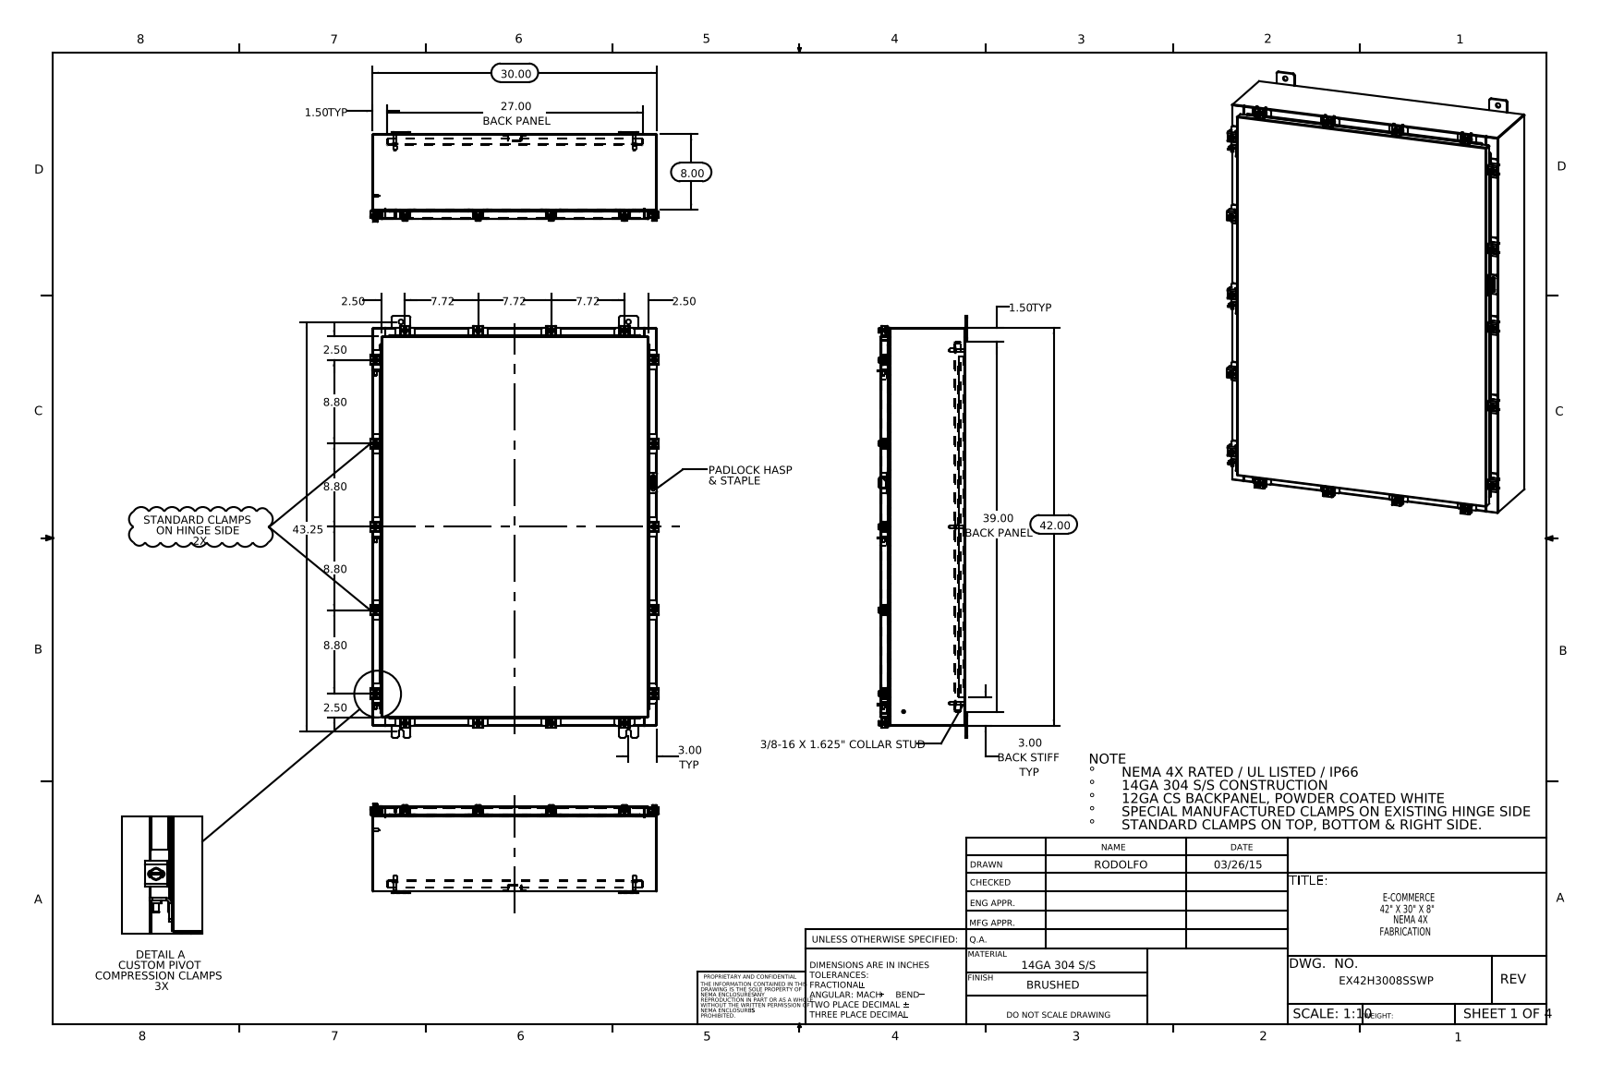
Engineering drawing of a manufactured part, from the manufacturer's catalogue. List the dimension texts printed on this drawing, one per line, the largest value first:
43.25
42.00
39.00 BACK PANEL
30.00
27.00 BACK PANEL
8.80
8.80
8.80
8.80
8.00
7.72
7.72
7.72
3.00 TYP
3.00 BACK STIFF TYP
2.50
2.50
2.50
2.50
1.50 TYP
1.50 TYP
